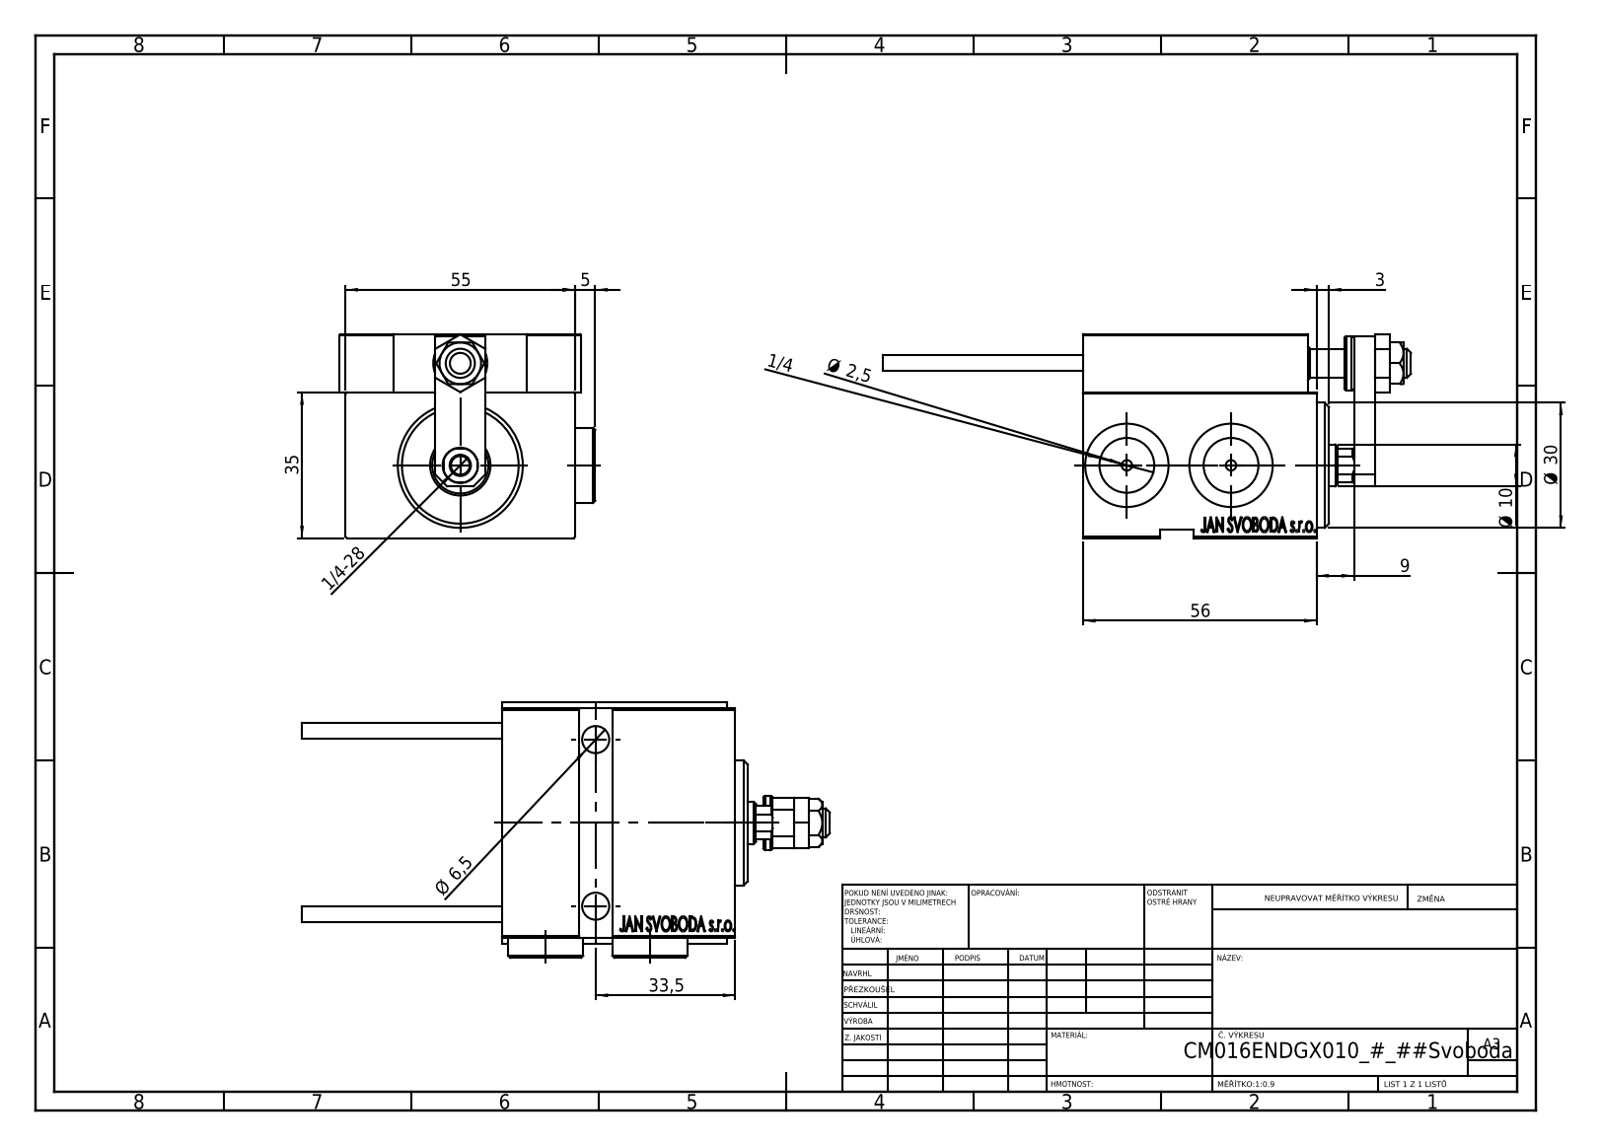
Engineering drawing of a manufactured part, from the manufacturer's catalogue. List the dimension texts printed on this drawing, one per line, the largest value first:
56
55
35
33,5
Ø 30
Ø 10
9
Ø 6,5
5
3
Ø 2,5
1/4-28
1/4
